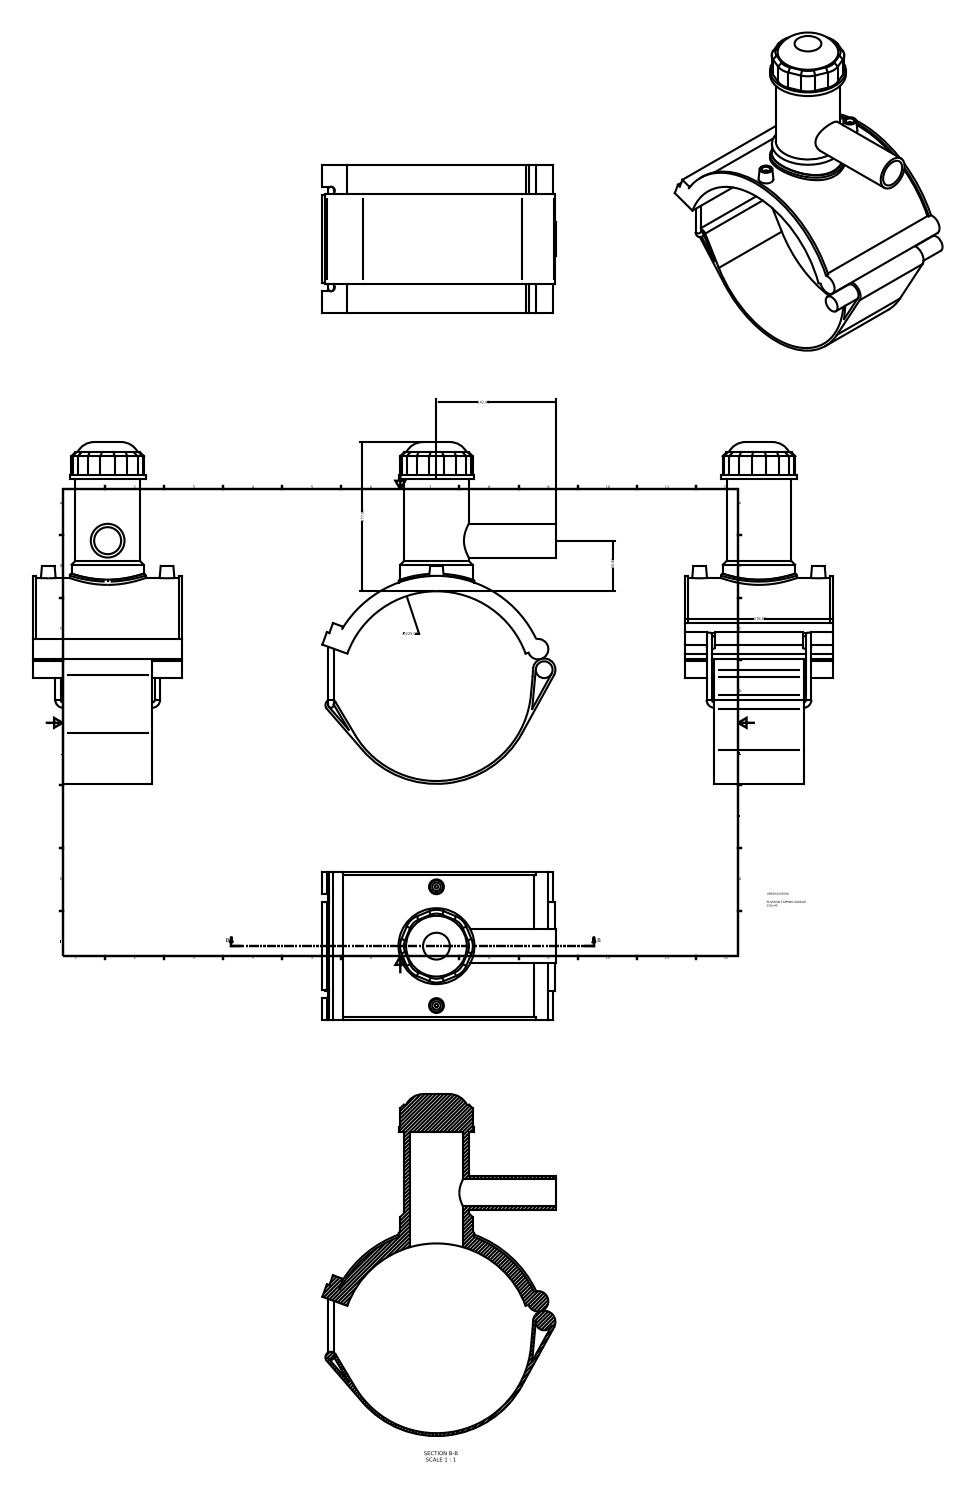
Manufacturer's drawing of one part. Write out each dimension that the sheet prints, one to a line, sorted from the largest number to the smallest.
∅225.00
177.00
176.00
142.00
60.00
